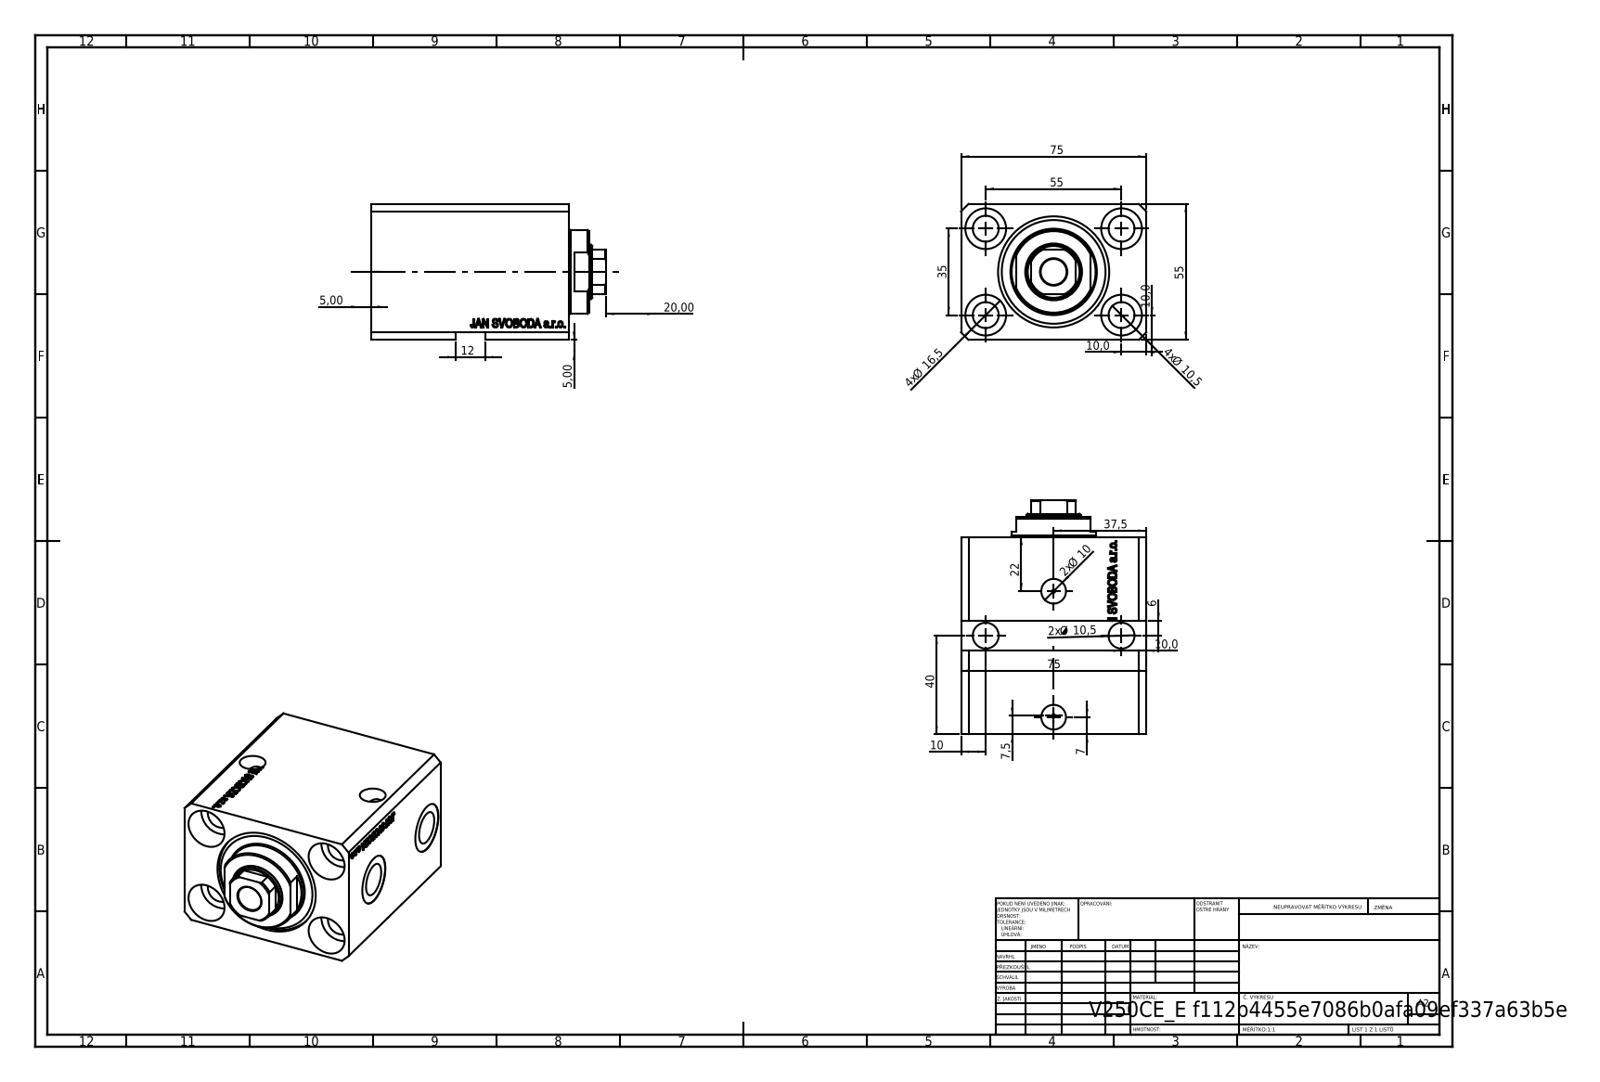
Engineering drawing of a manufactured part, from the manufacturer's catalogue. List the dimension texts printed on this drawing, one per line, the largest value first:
75
75
55
55
40
37,5
35
22
20,00
4x Ø 16,5
12
4x Ø 10,5
2x Ø 10,5
10,0
10,0
2x Ø 10
10,0
10
7,5
7
6
5,00
5,00
